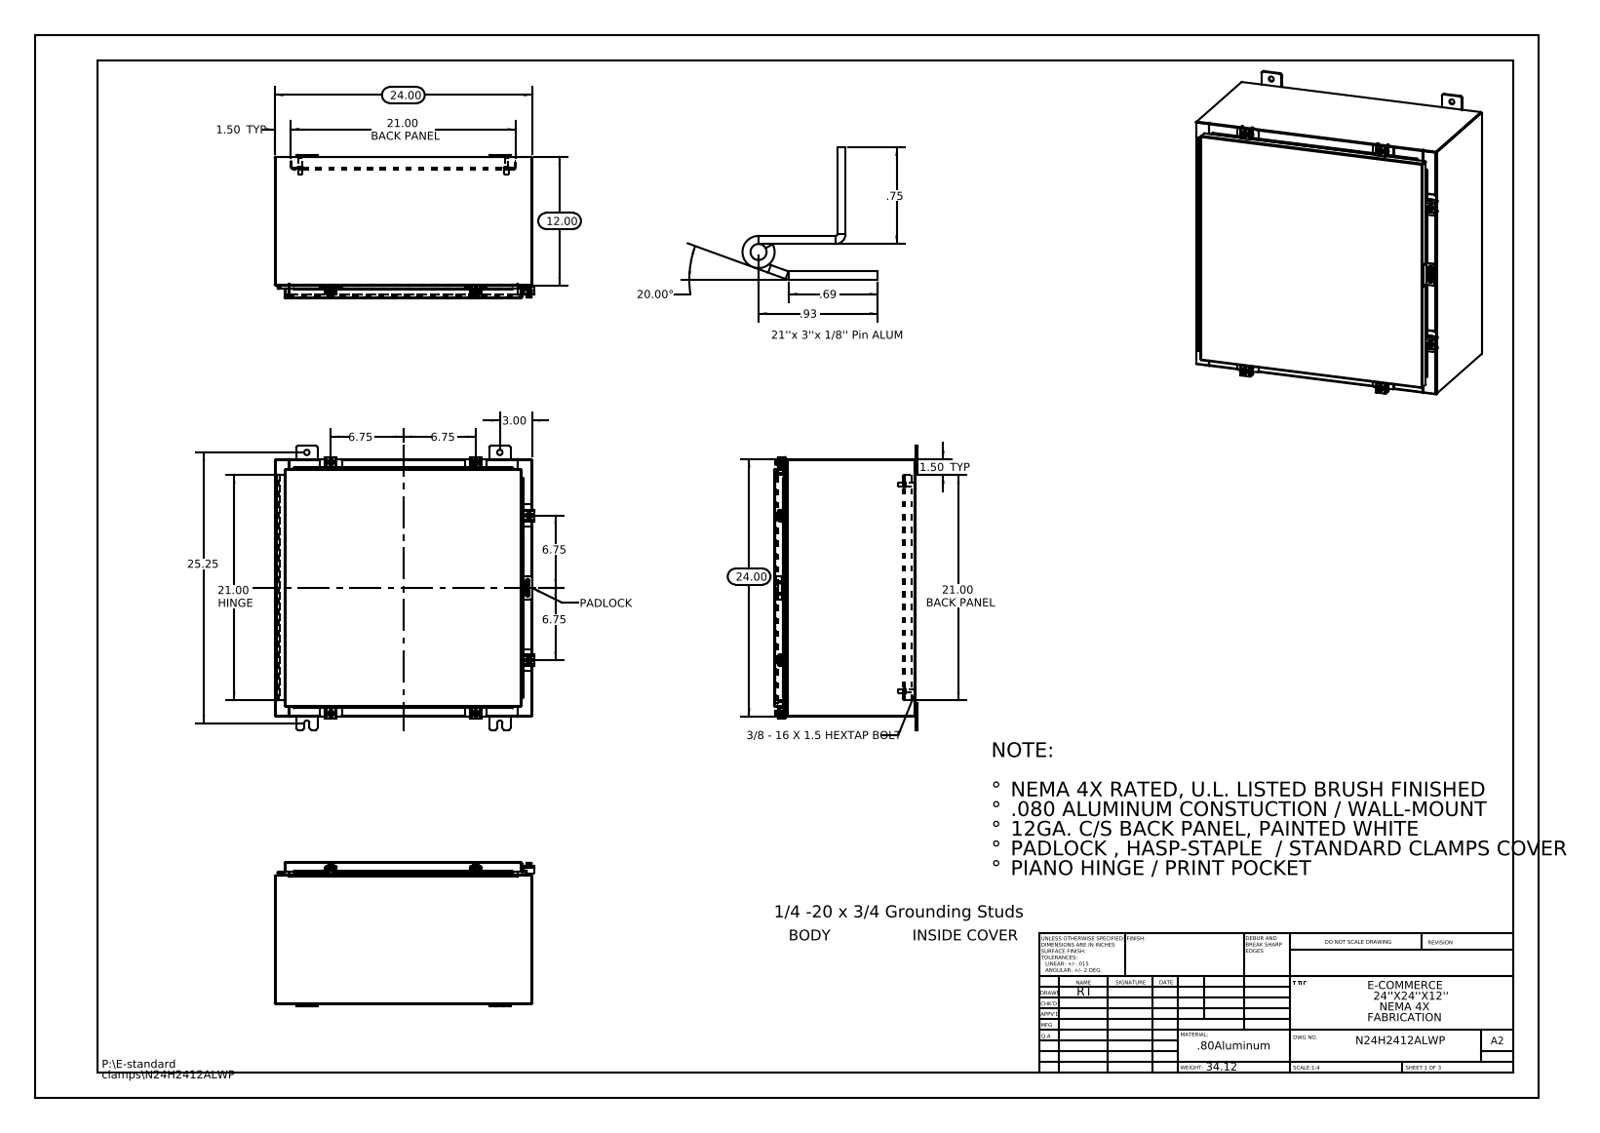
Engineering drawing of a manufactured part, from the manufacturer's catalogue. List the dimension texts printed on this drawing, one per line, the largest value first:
25.25
24.00
24.00
21.00 HINGE
21.00 BACK PANEL
21.00 BACK PANEL
20.00°
12.00
6.75
6.75
6.75
6.75
3.00
1.50 TYP
1.50 TYP
.93
.75
.69
